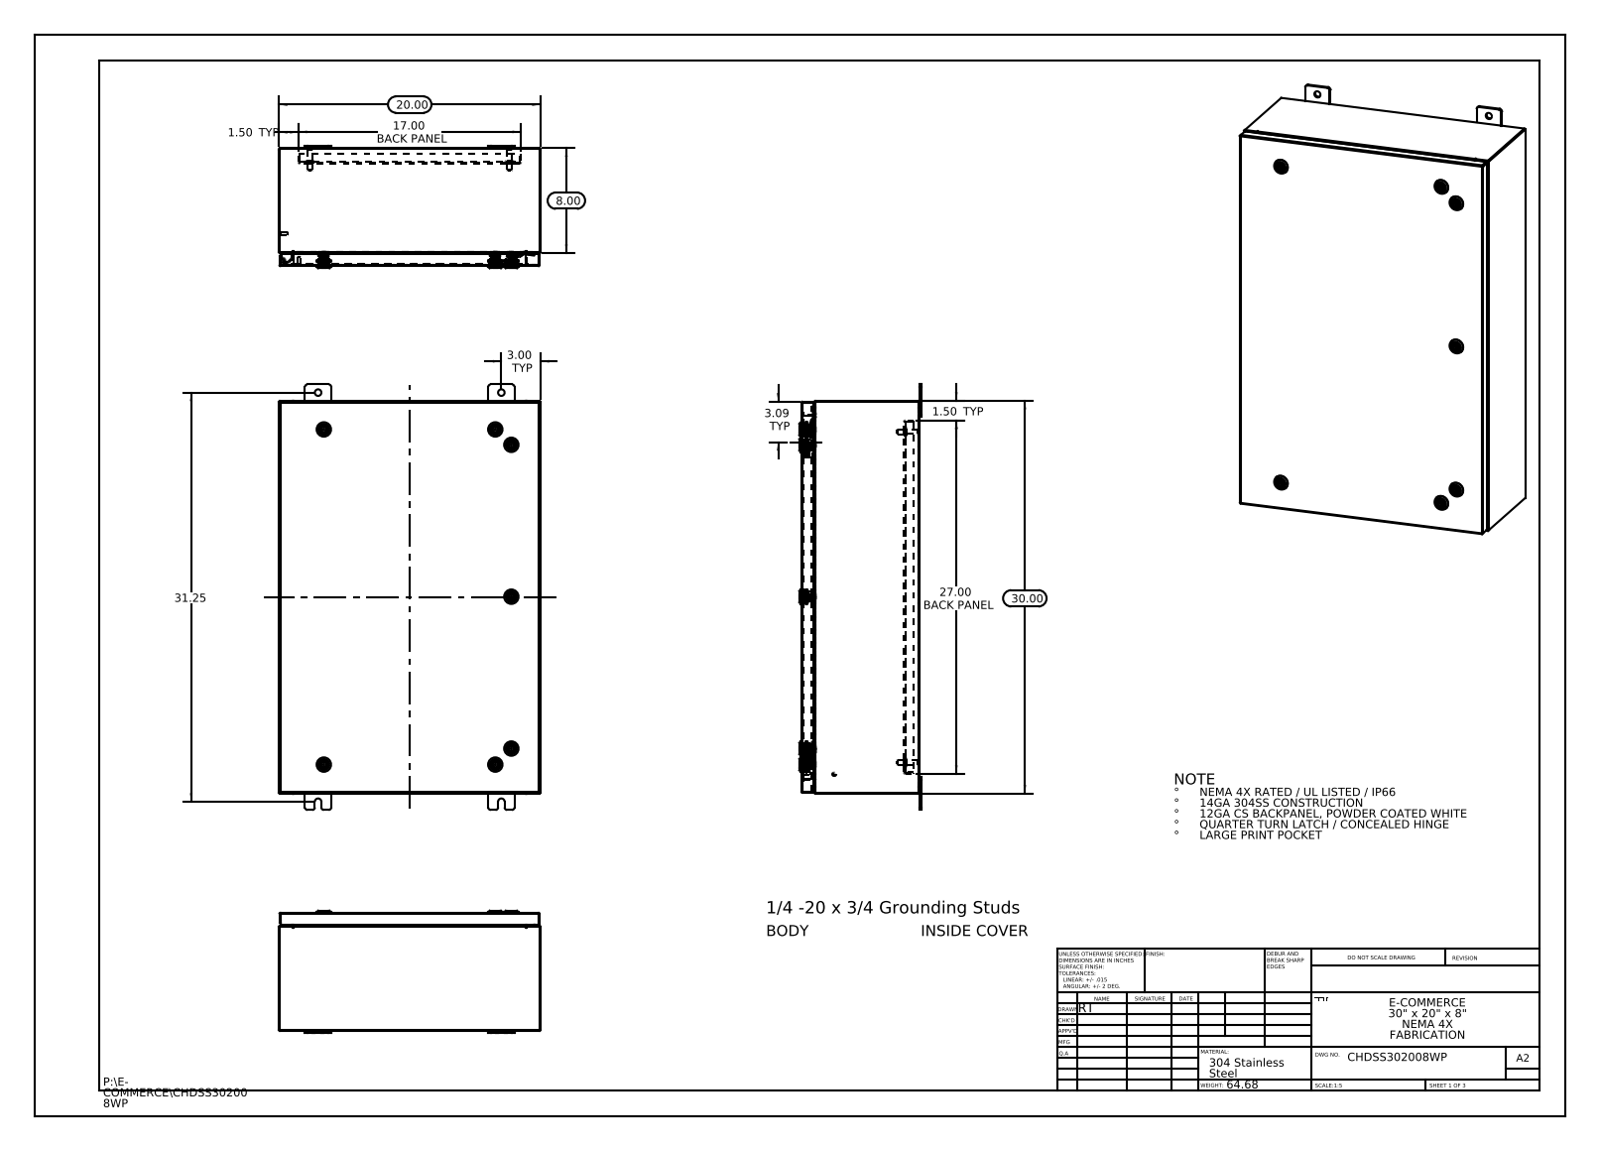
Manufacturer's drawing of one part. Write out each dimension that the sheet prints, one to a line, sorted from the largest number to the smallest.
31.25
30.00
27.00 BACK PANEL
20.00
17.00 BACK PANEL
8.00
3.09 TYP
3.00 TYP
1.50 TYP
1.50 TYP
